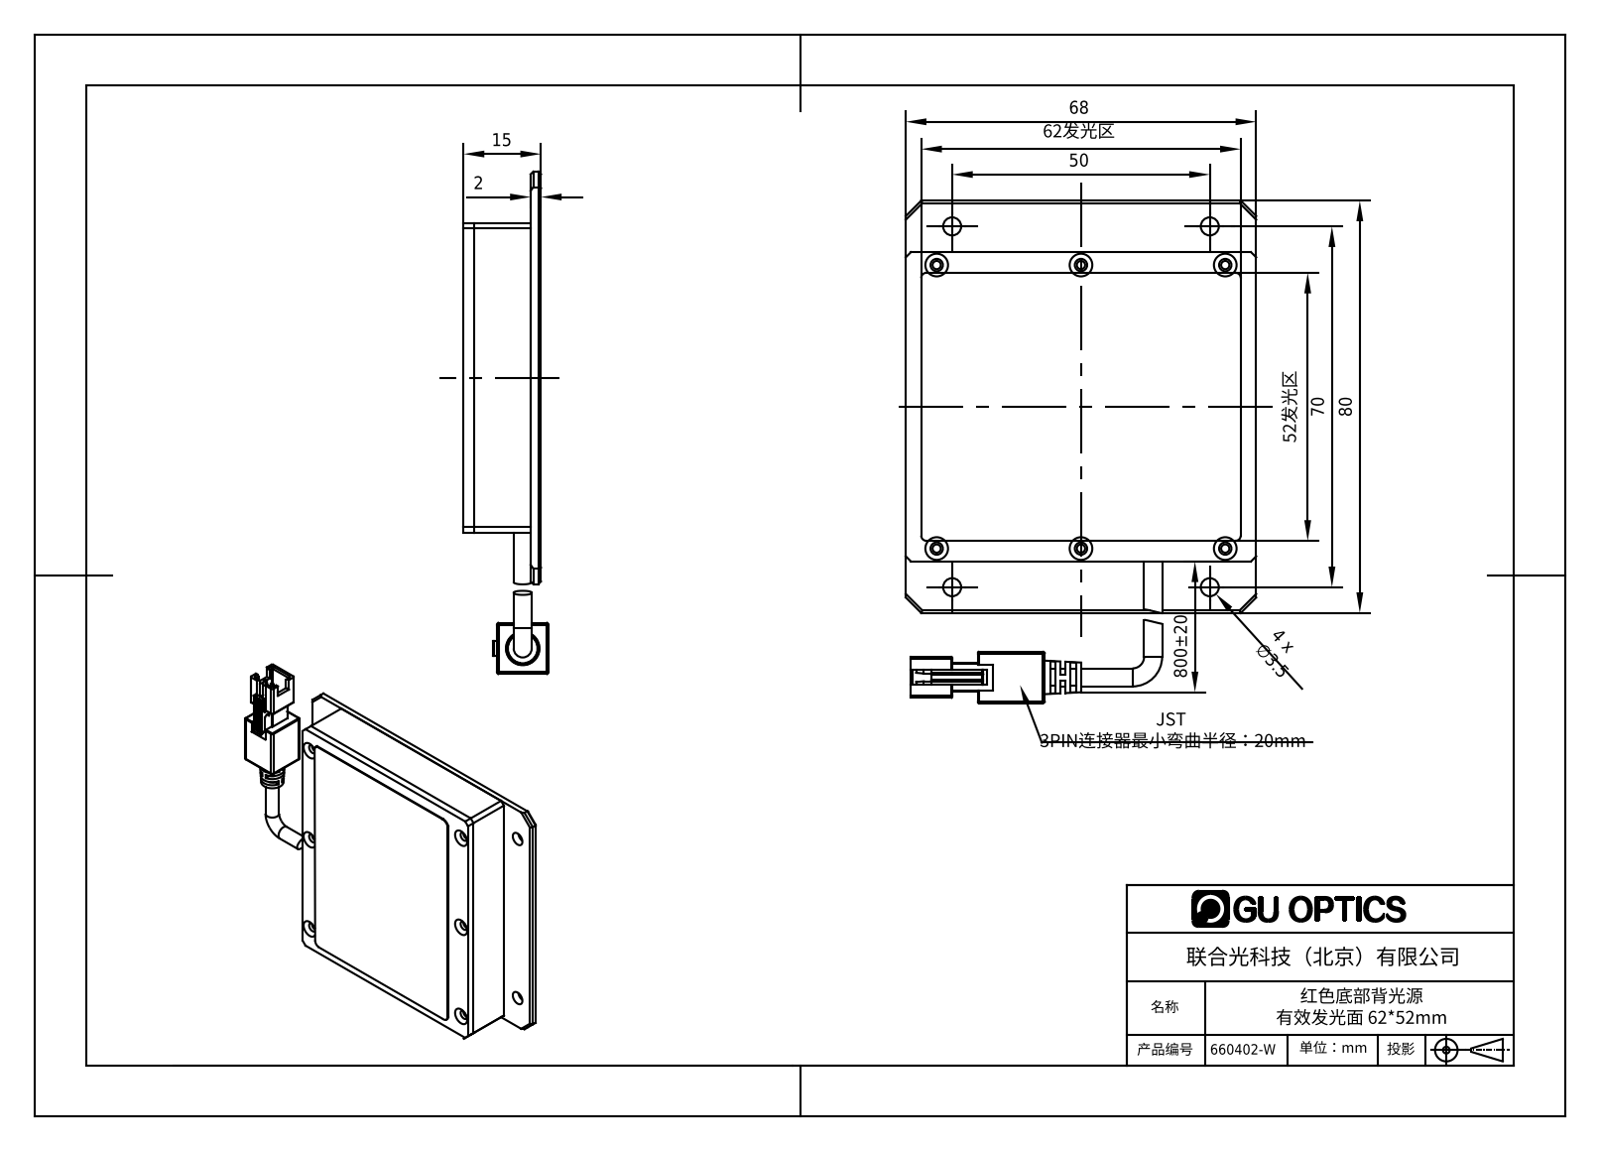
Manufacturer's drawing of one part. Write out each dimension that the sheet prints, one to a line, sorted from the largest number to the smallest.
800±20
80
70
68
62发光区
52发光区
50
15
4 x ∅3.5
2
